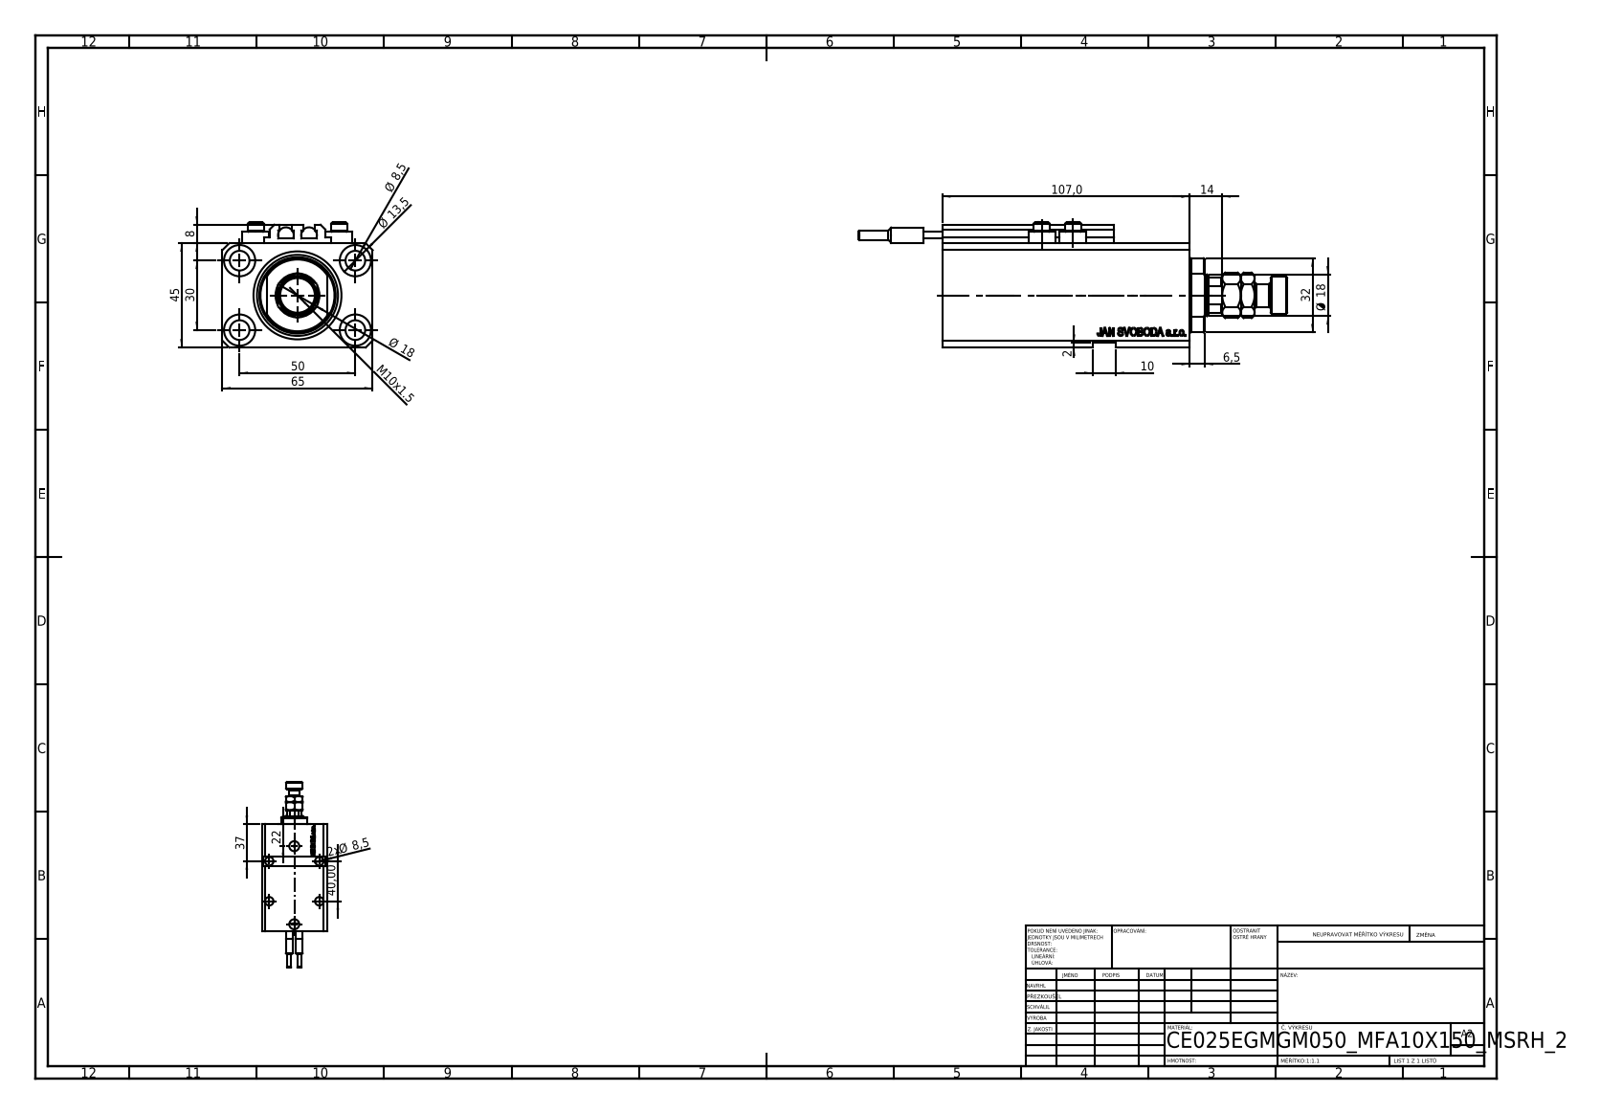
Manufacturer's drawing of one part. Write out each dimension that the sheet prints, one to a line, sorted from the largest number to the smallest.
107,0
65
50
45
40,00
37
32
30
22
Ø 18
Ø 18
14
Ø 13,5
M10x1.5
10
Ø 8,5
2x Ø 8,5
8
6,5
2
